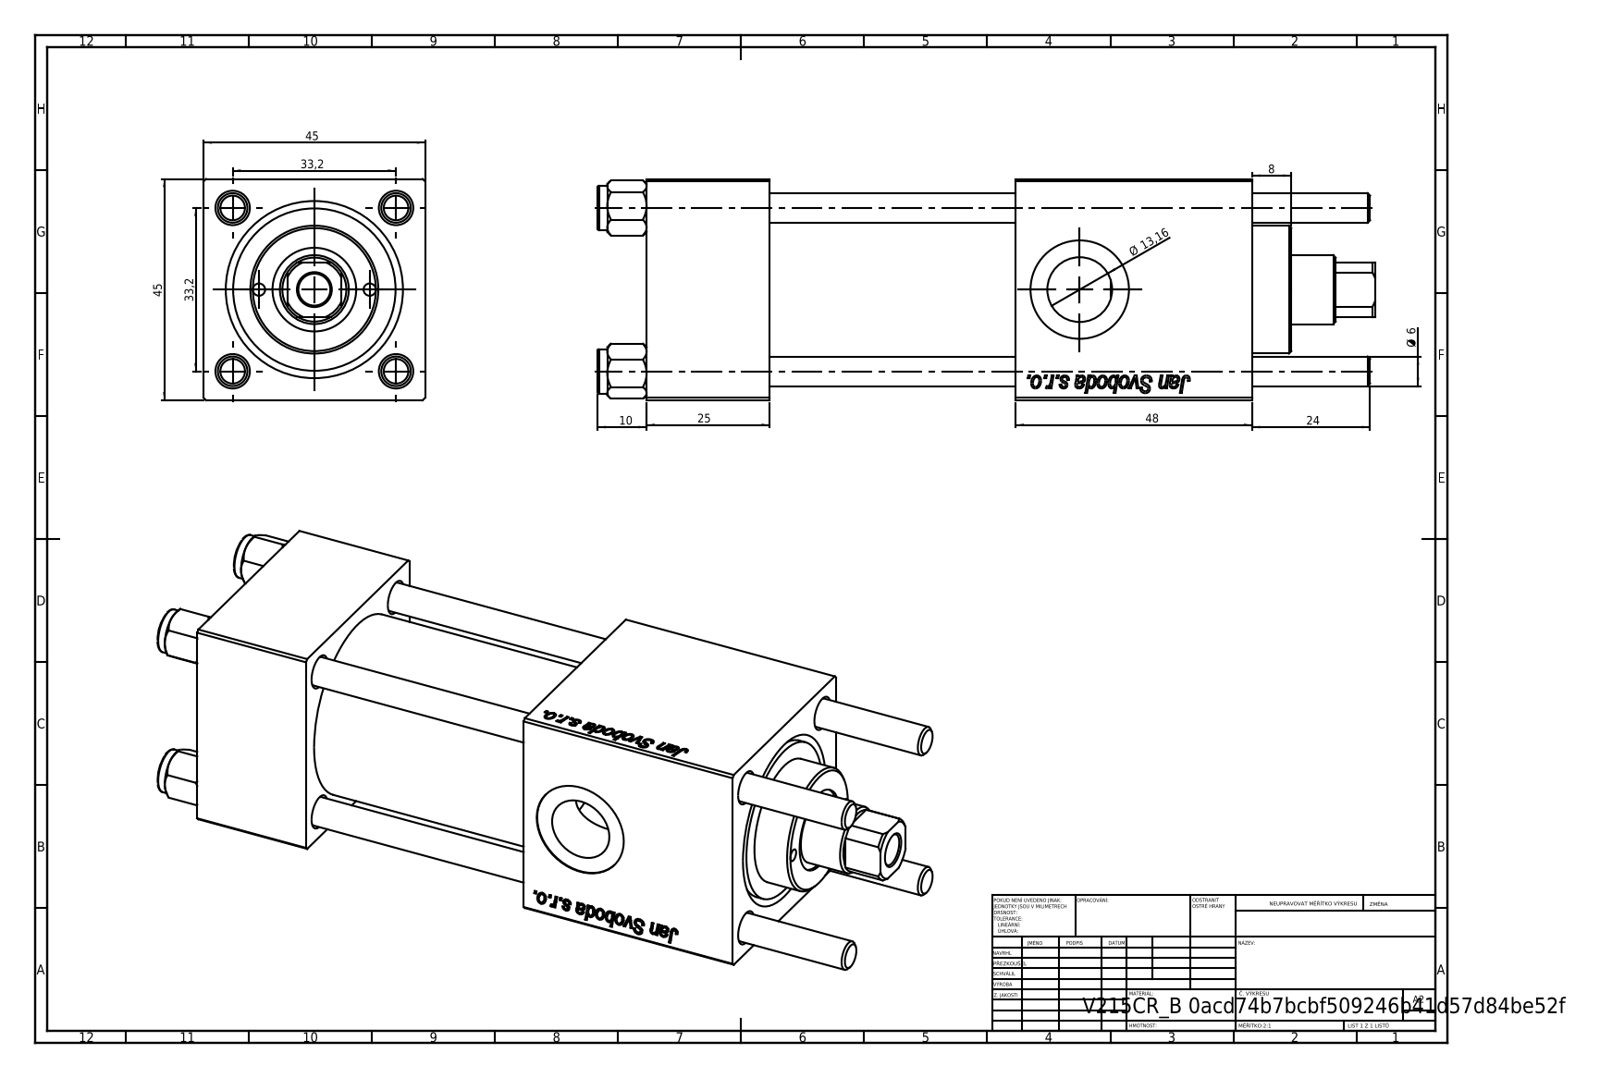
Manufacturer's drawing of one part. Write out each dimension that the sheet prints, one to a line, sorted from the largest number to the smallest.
48
45
45
33,2
33,2
25
24
Ø 13,16
10
8
Ø 6
